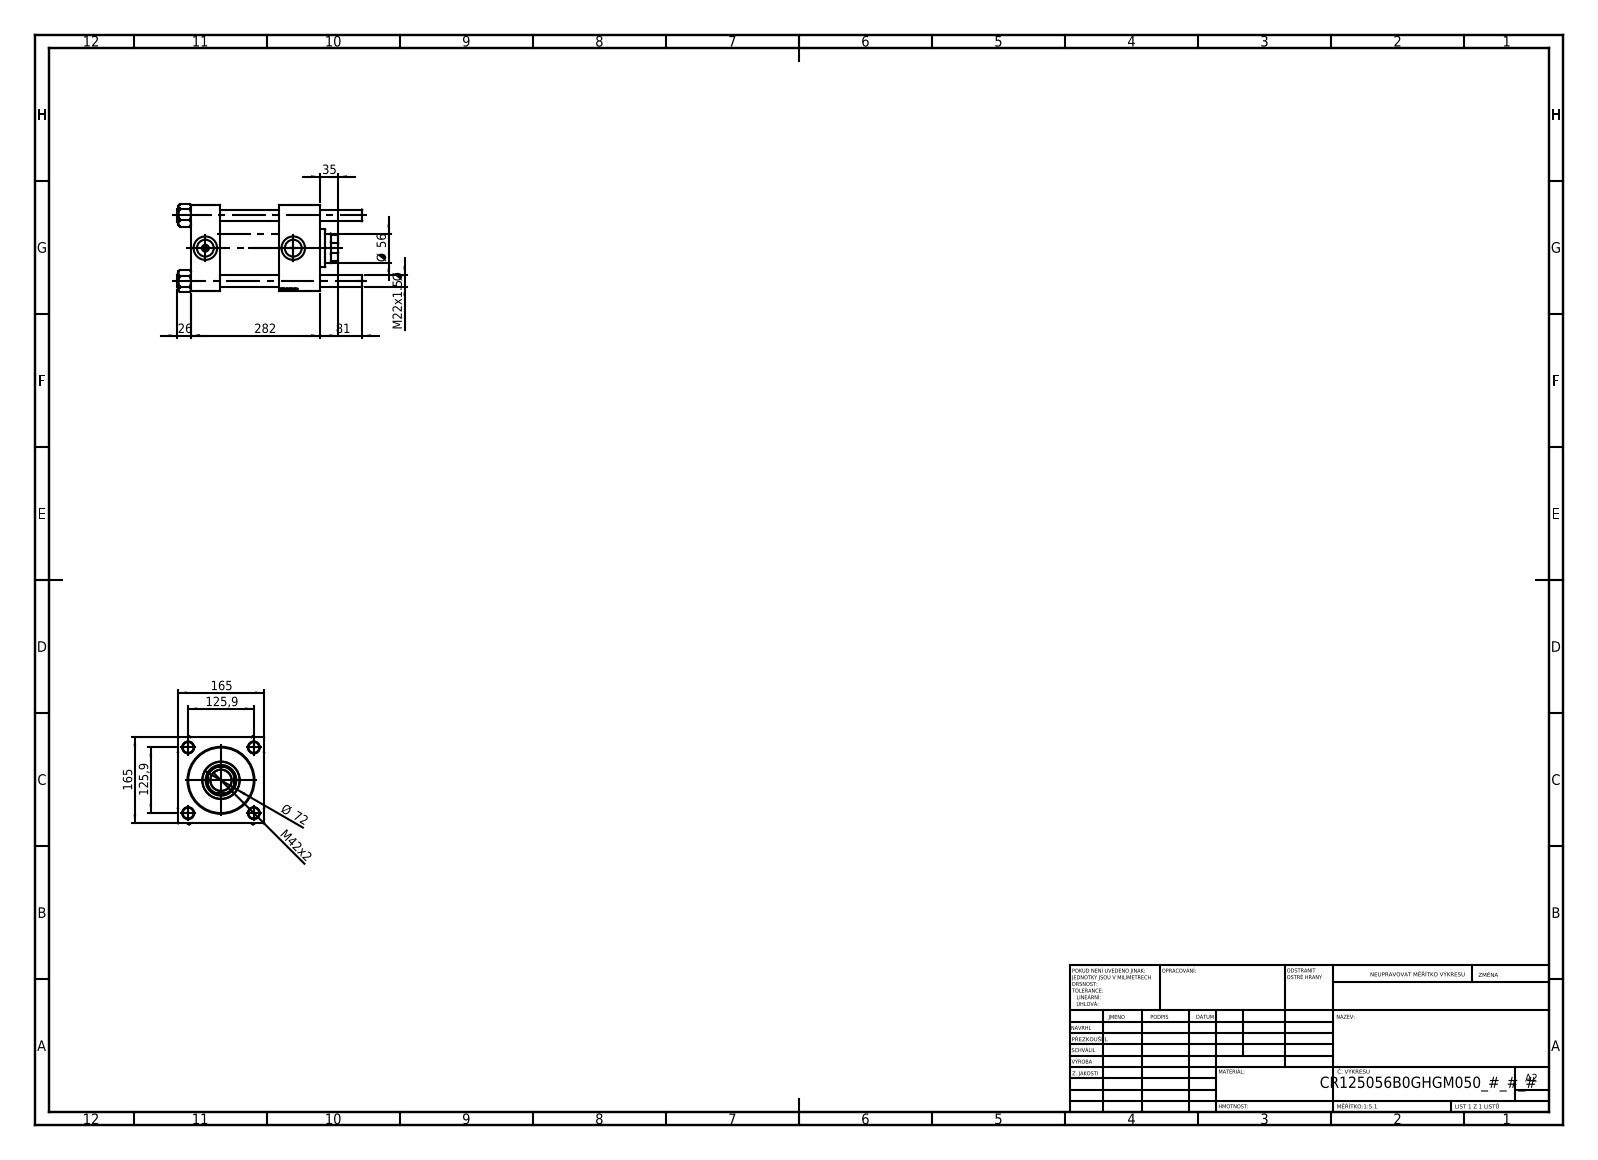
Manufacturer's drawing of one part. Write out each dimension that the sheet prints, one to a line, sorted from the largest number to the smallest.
282
165
165
125,9
125,9
81
Ø 72
Ø 56
M42x2
35
26
M22x1.5 Ø
